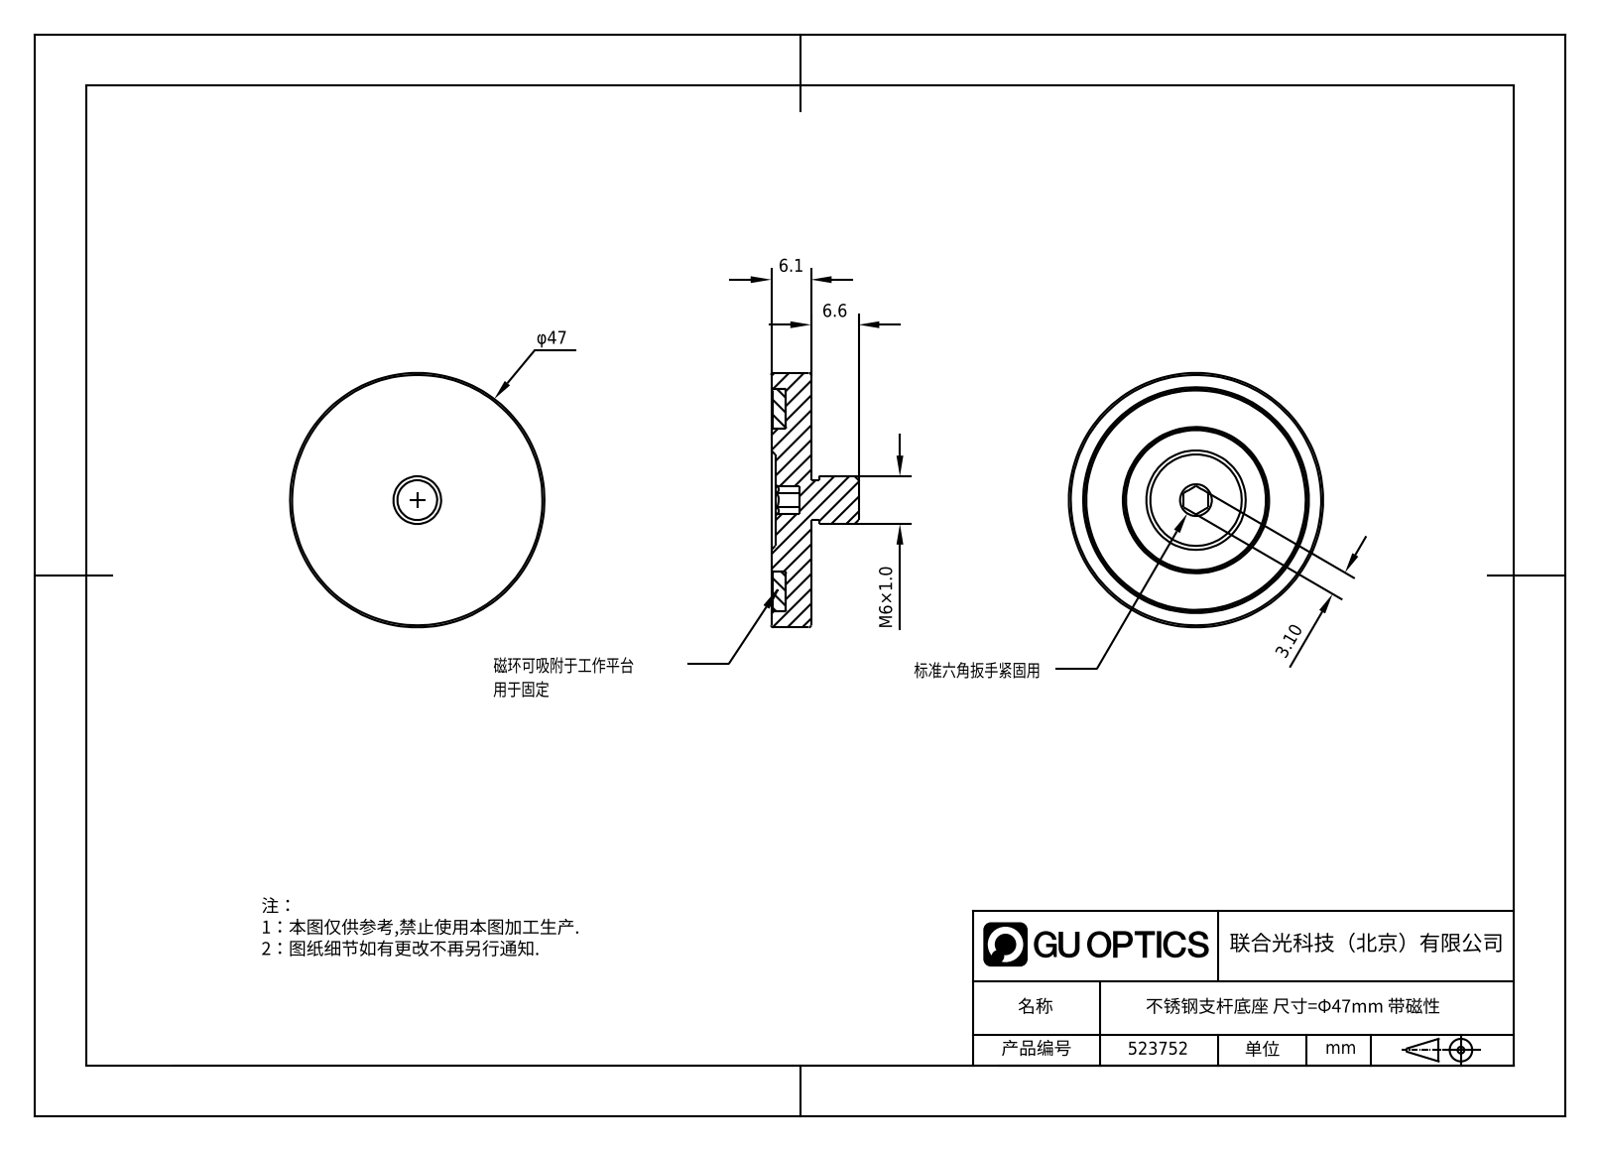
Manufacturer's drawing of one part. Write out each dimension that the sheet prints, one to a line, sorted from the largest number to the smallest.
6.6
6.1
M6×1.0
3.10
